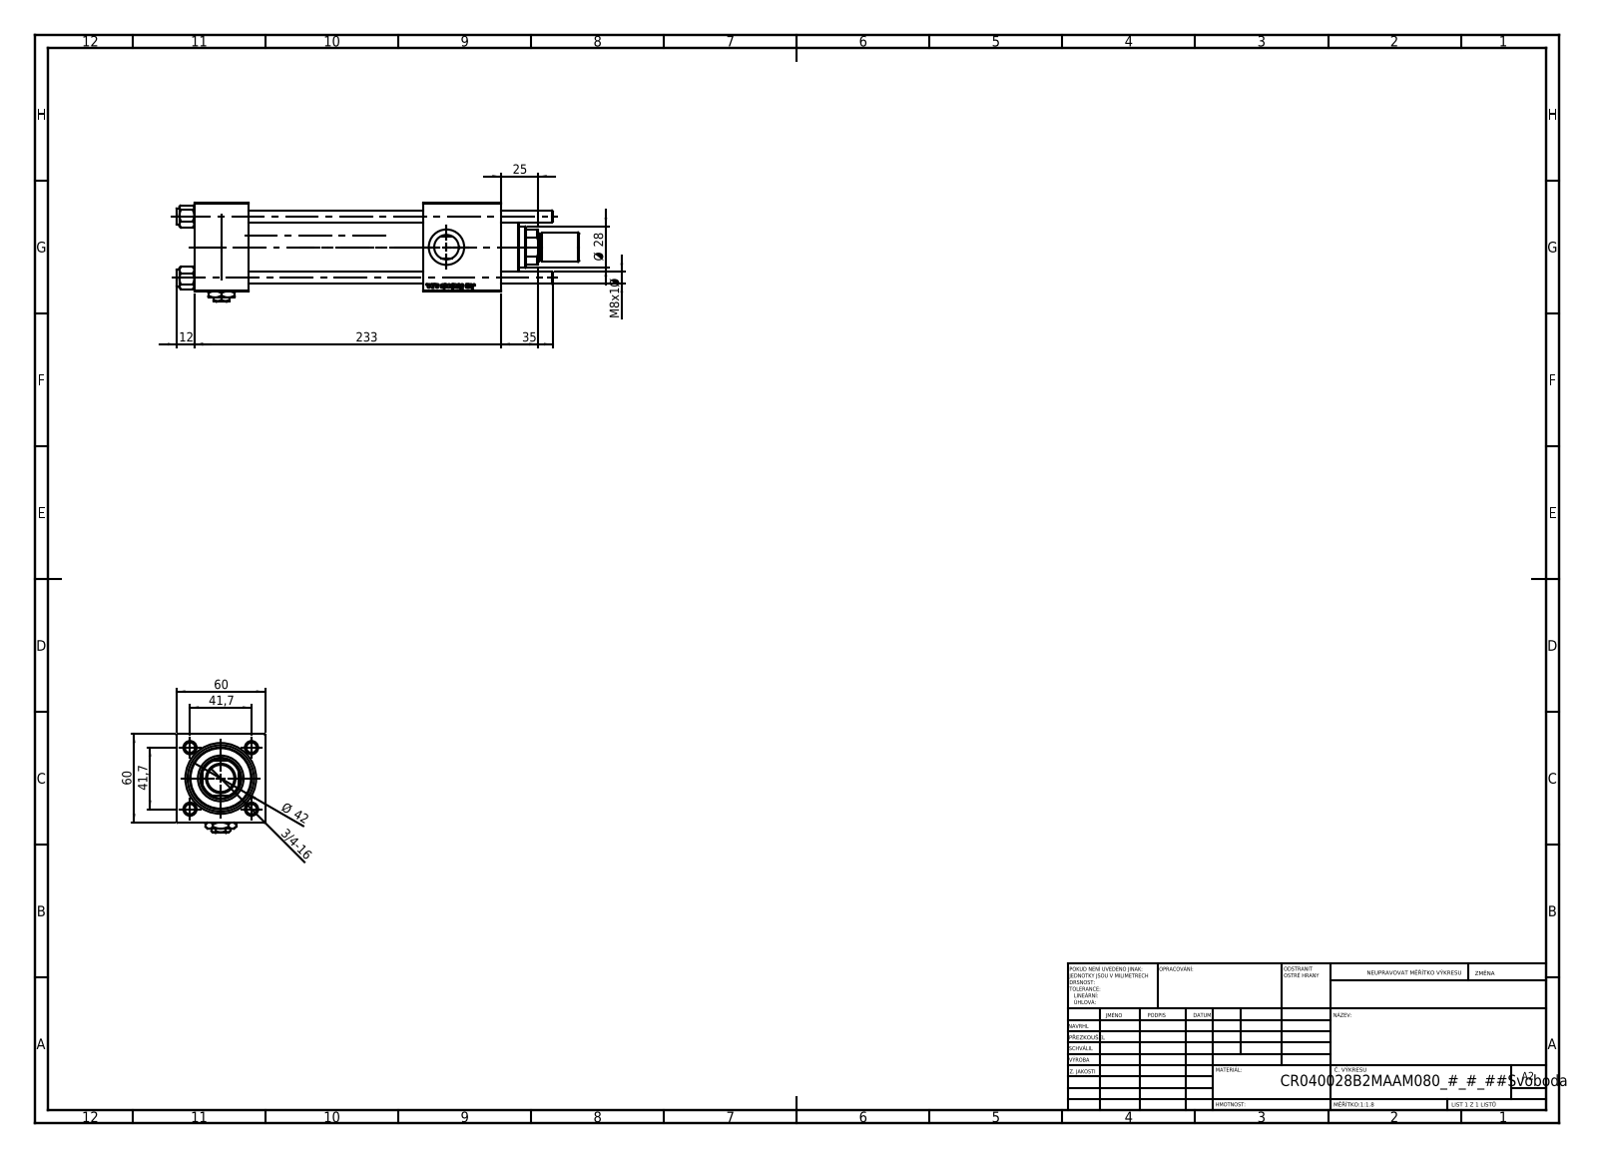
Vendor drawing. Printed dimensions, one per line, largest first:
233
60
60
Ø 42
41,7
41,7
35
Ø 28
25
12
M8x1 Ø
3/4-16
